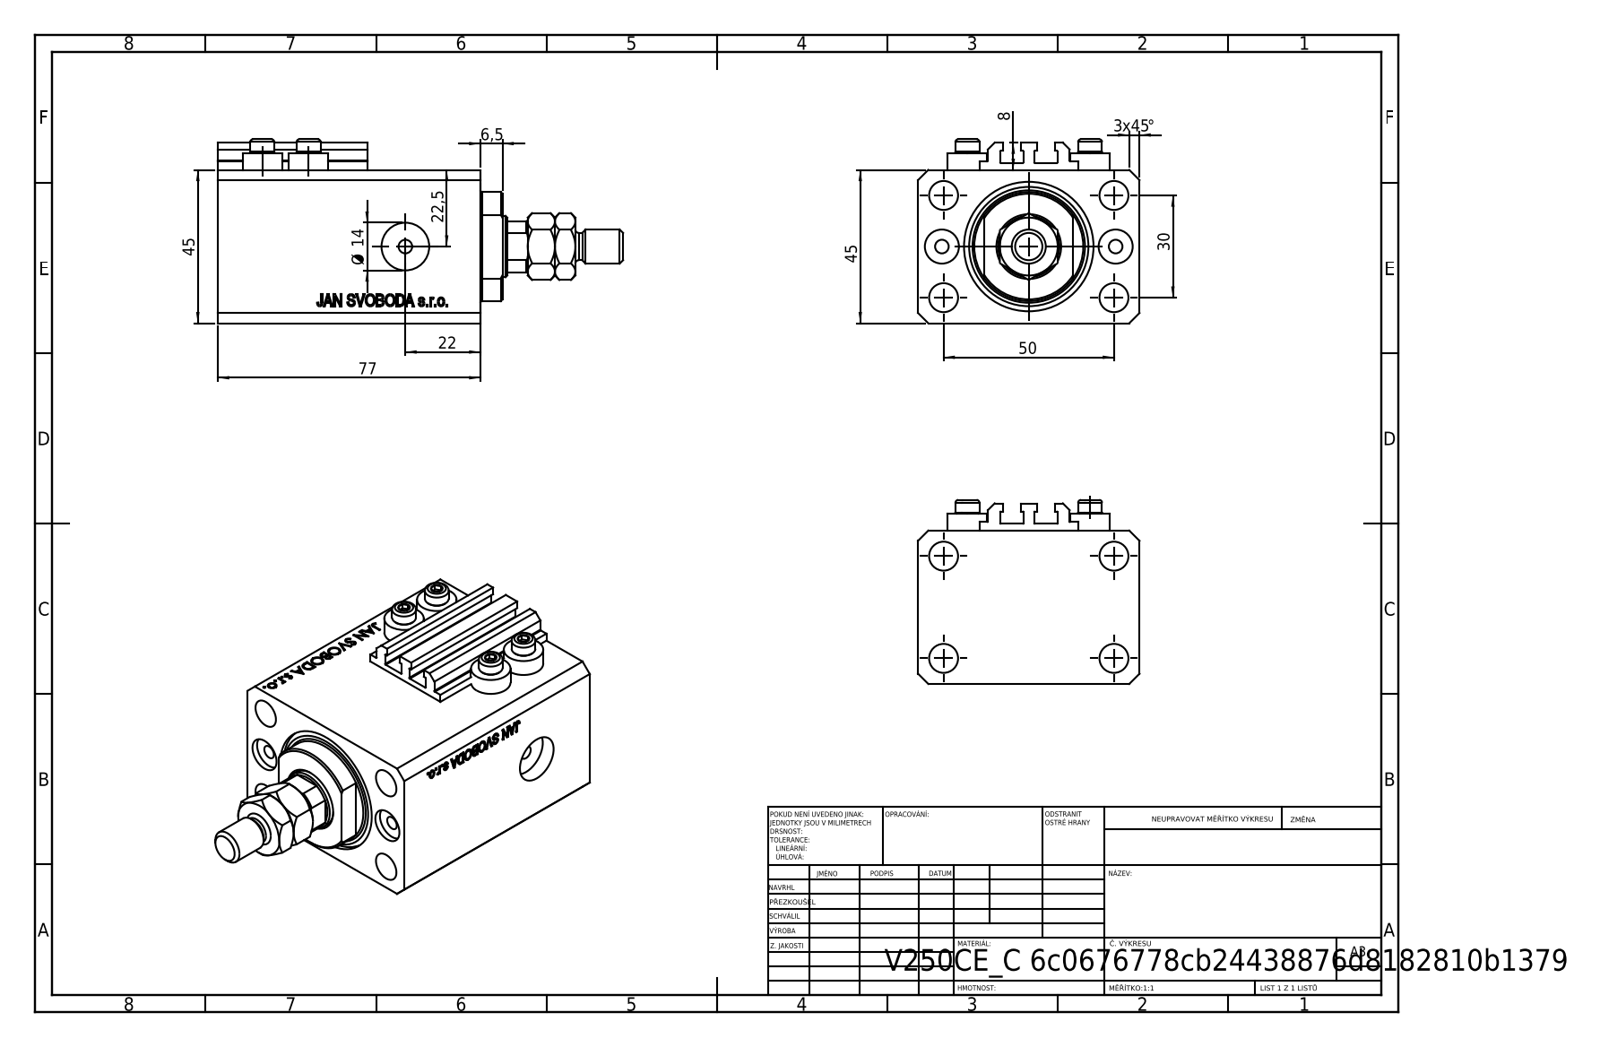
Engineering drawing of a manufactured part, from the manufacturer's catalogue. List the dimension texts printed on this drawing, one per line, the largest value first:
77
50
45
3 x45 °
45
30
22,5
22
Ø 14
8
6,5
